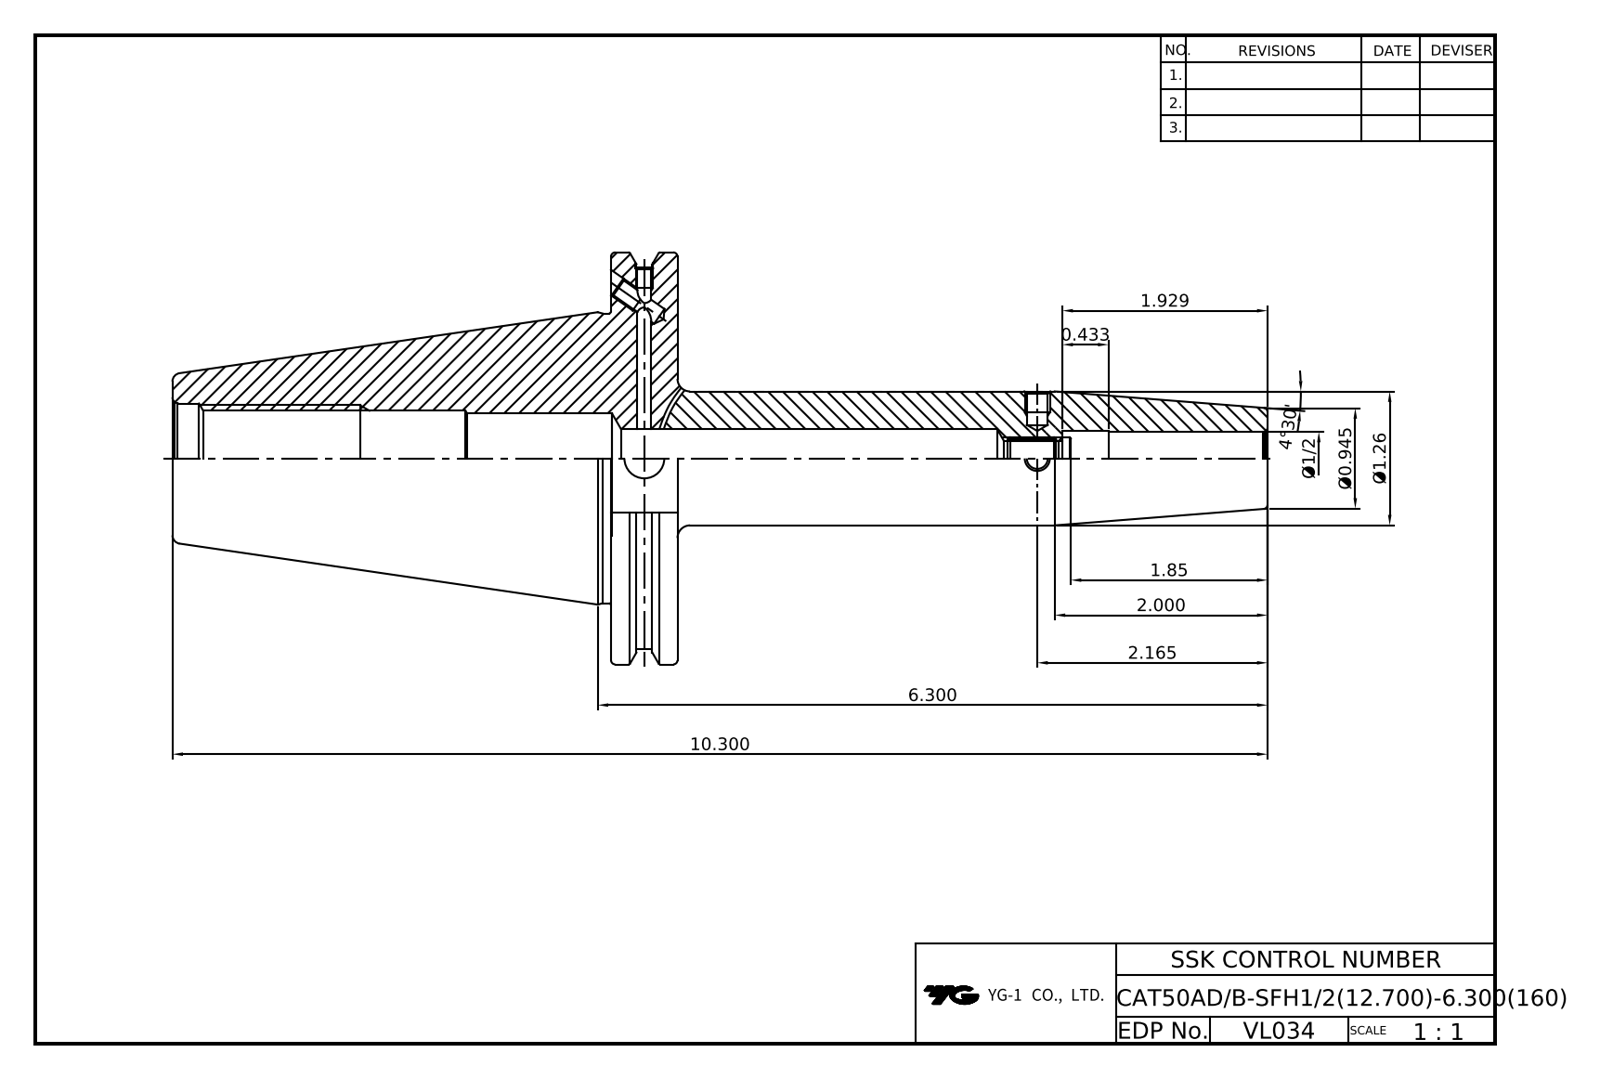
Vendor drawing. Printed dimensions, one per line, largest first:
10.300
6.300
4°30'
2.165
2.000
1.929
1.85
Ø1.26
Ø0.945
0.433
